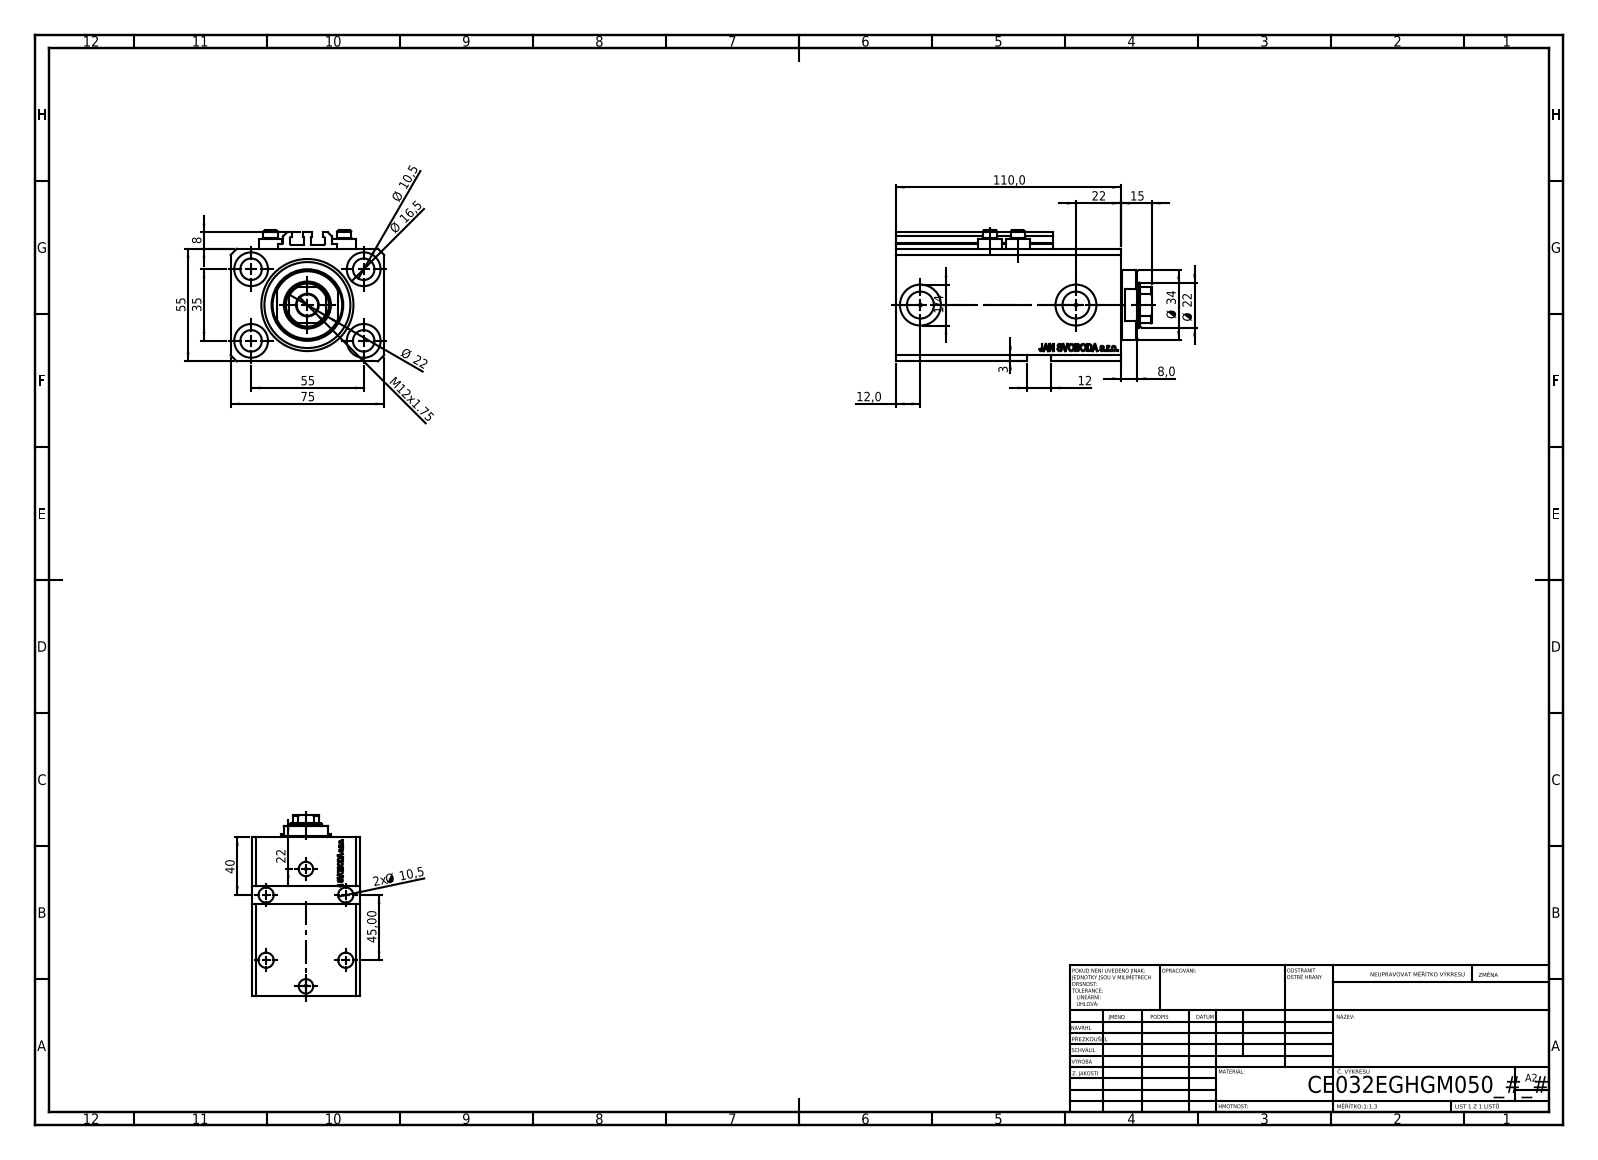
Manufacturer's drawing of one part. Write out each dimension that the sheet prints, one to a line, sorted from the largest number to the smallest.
110,0
75
55
55
45,00
40
35
Ø 34
Ø 22
22
Ø 22
22
Ø 16,5
15
M12x1.75
12,0
12
Ø 10,5
2x Ø 10,5
8
8,0
3
1/4
